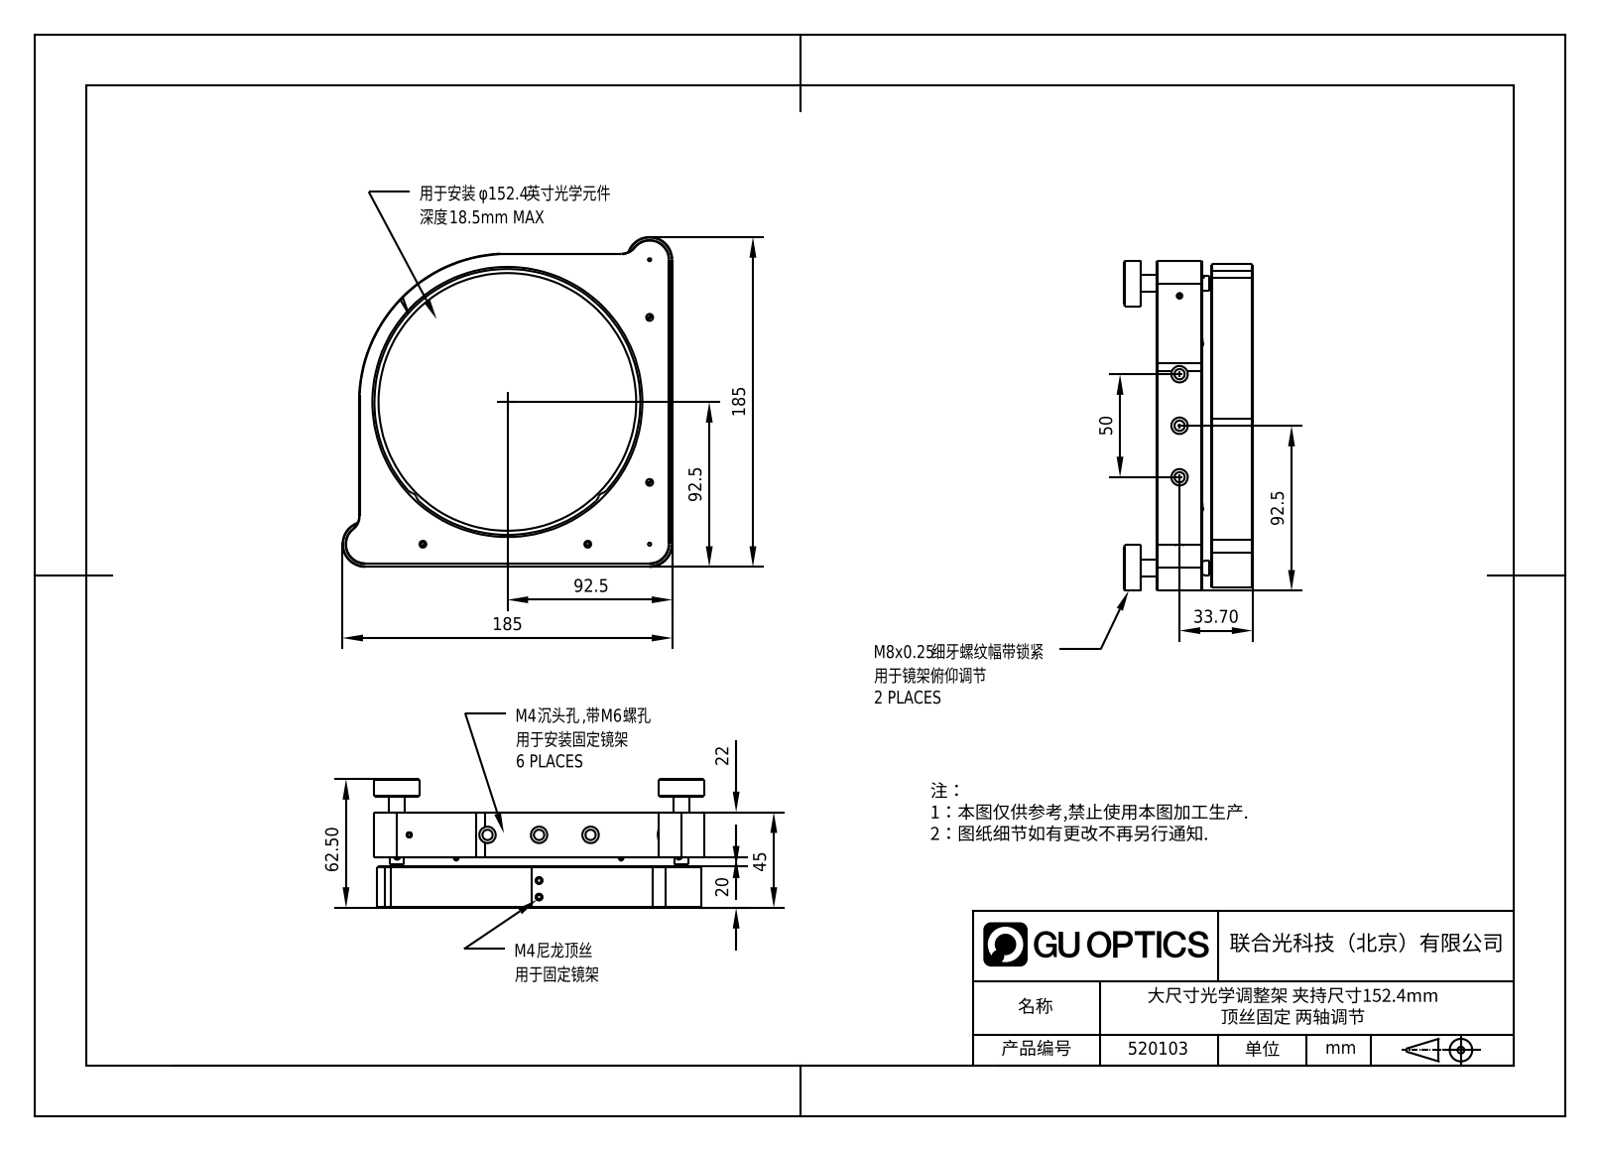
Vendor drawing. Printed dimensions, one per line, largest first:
185
185
92.5
92.5
92.5
62.50
50
45
33.70
22
20
